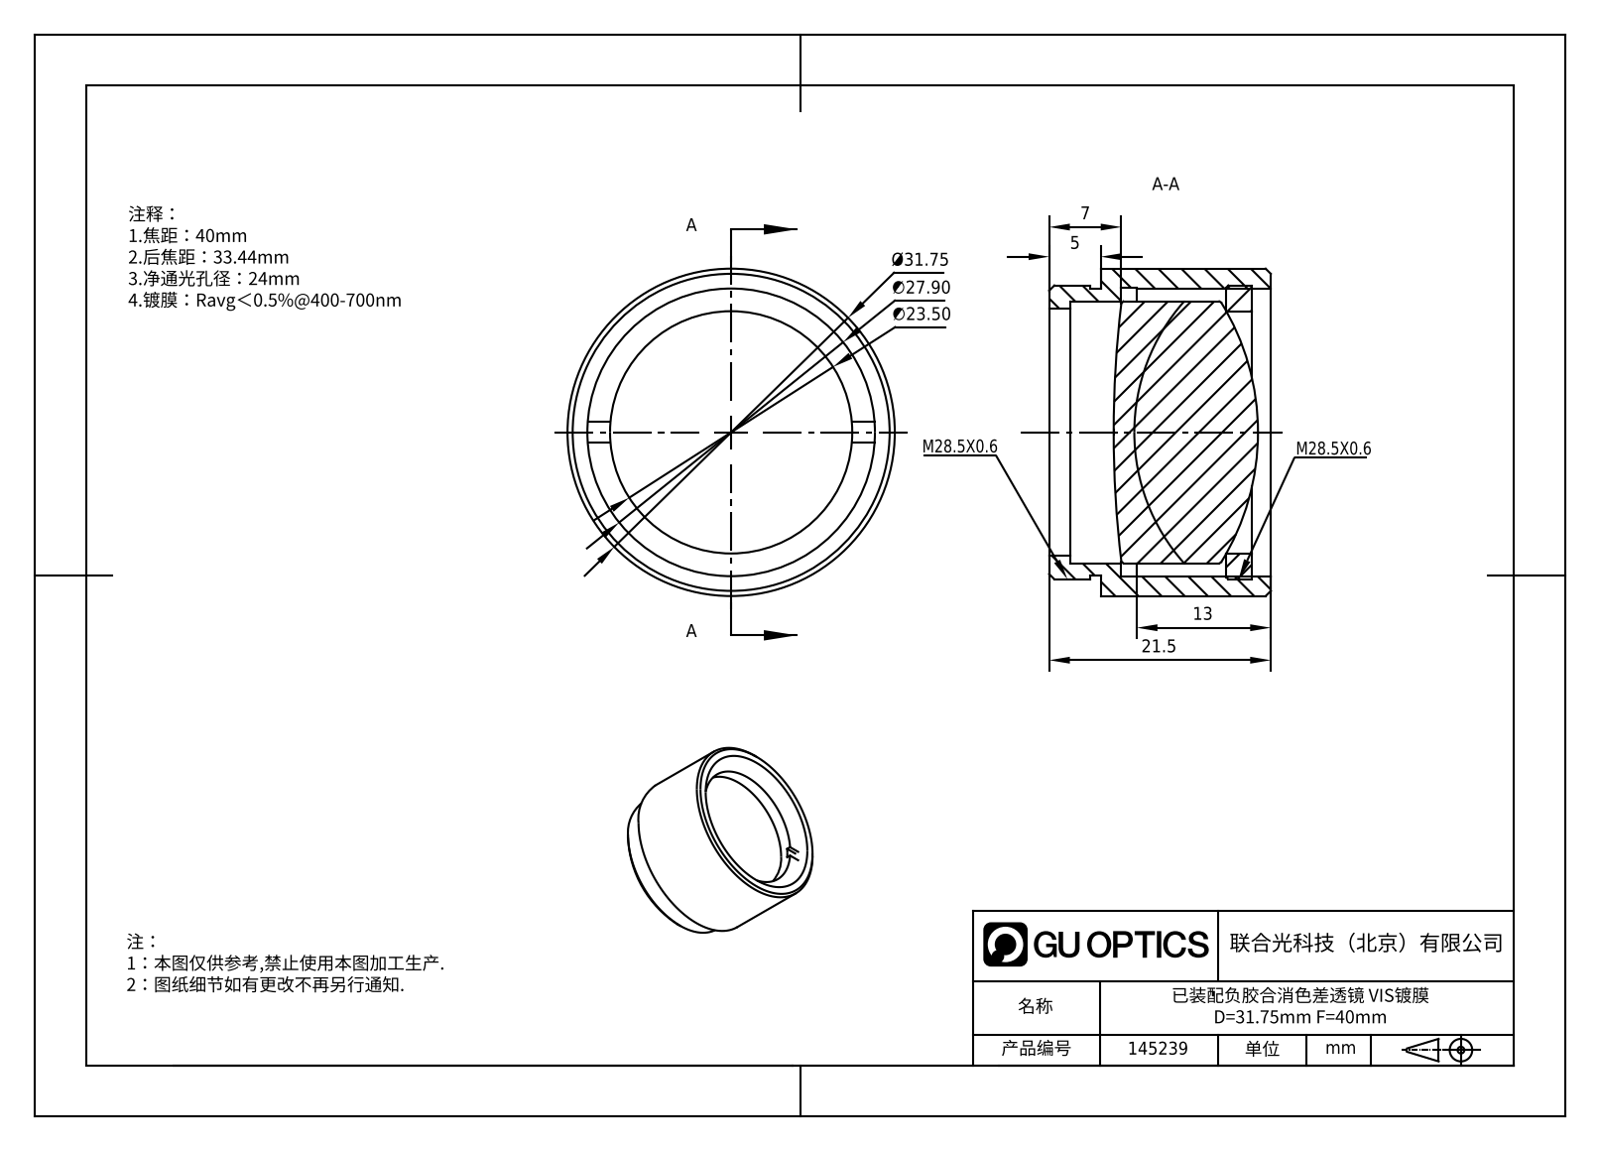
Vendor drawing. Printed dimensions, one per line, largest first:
Ø31.75
∅27.90
∅23.50
21.5
13
7
5
